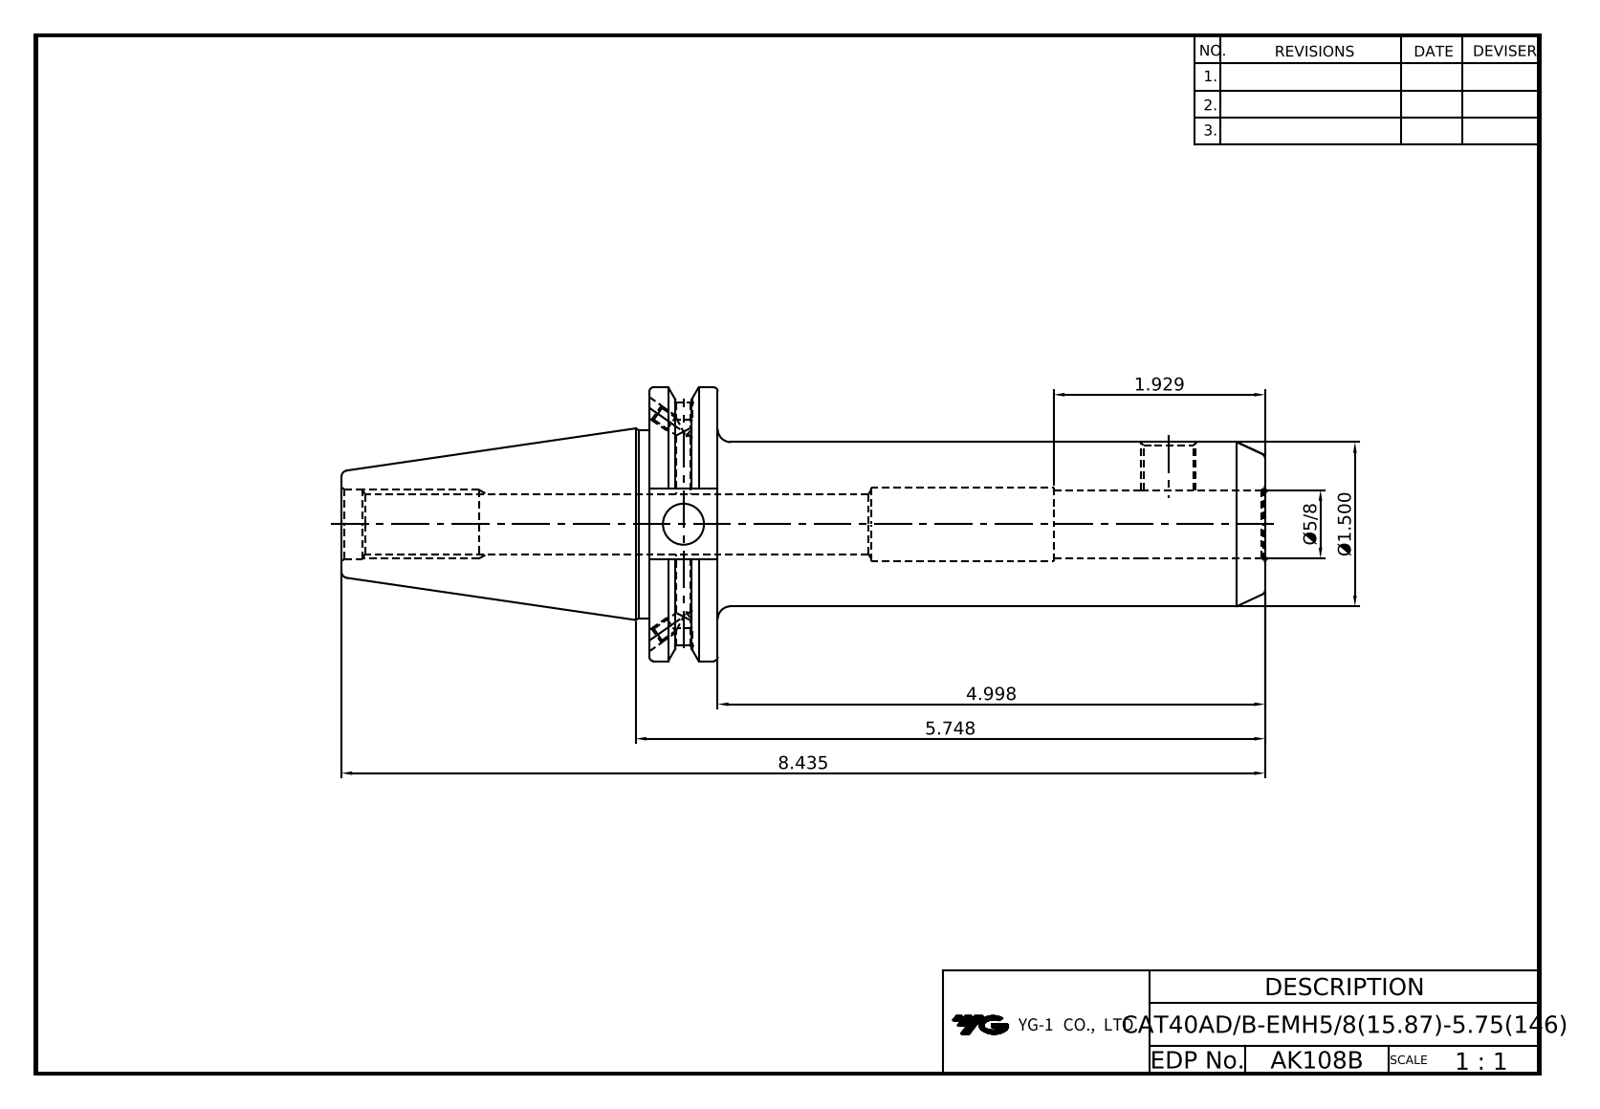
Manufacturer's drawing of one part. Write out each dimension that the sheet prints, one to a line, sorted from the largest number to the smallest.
8.435
5.748
4.998
1.929
Ø1.500
Ø5/8
